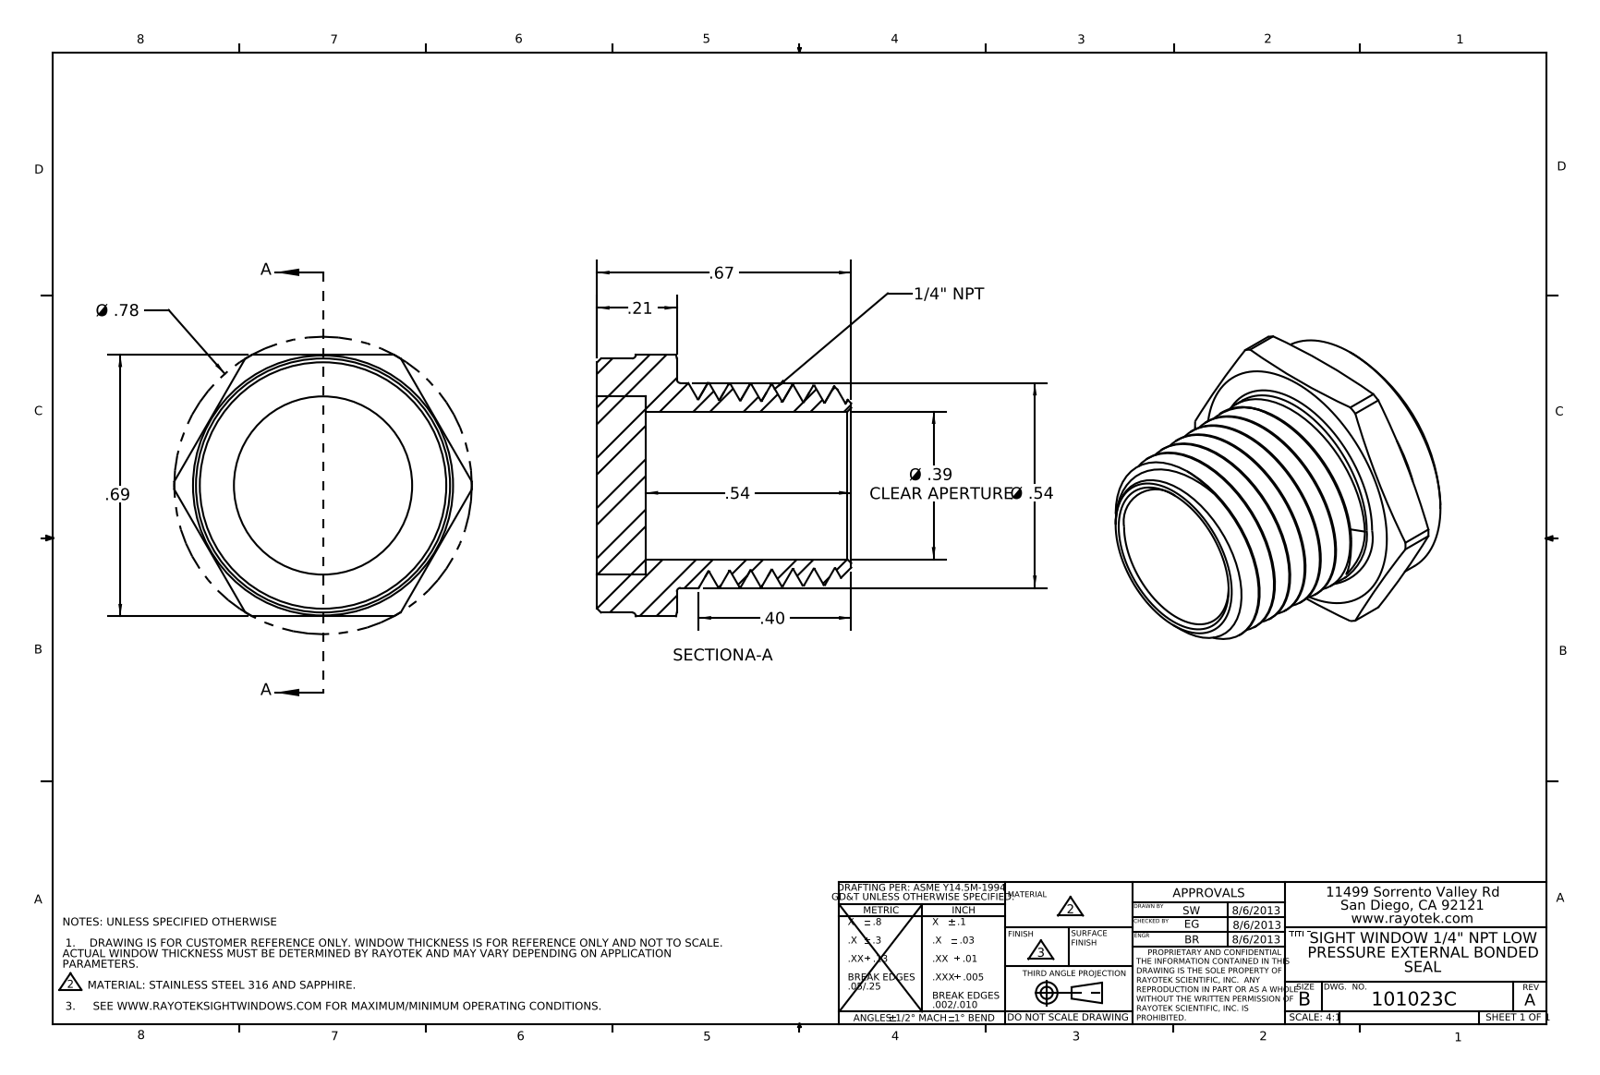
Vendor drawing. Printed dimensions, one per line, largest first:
Ø .78
.69
.67
.54
Ø .54
.40
Ø .39 CLEAR APERTURE
.21
